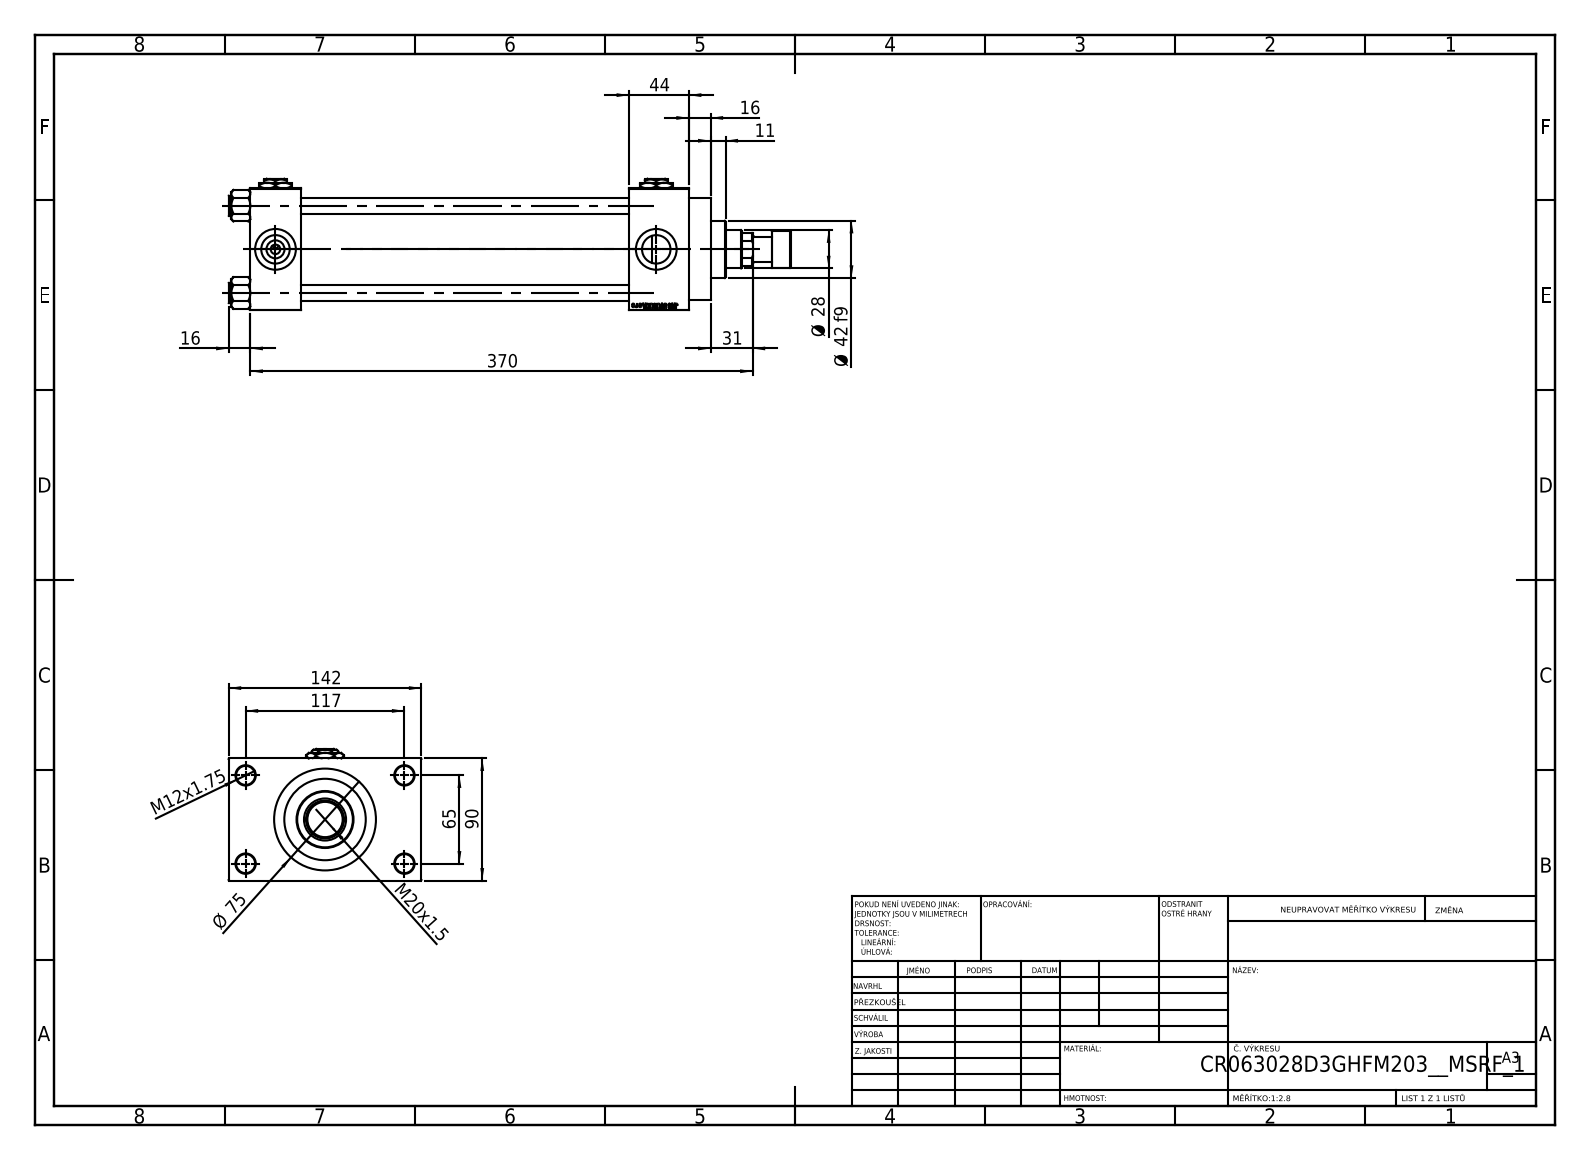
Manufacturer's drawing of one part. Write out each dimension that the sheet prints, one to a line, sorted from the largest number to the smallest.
370
142
117
90
Ø 75
65
44
Ø 42 f9
31
Ø 28
M20x1.5
16
16
M12x1.75
11
